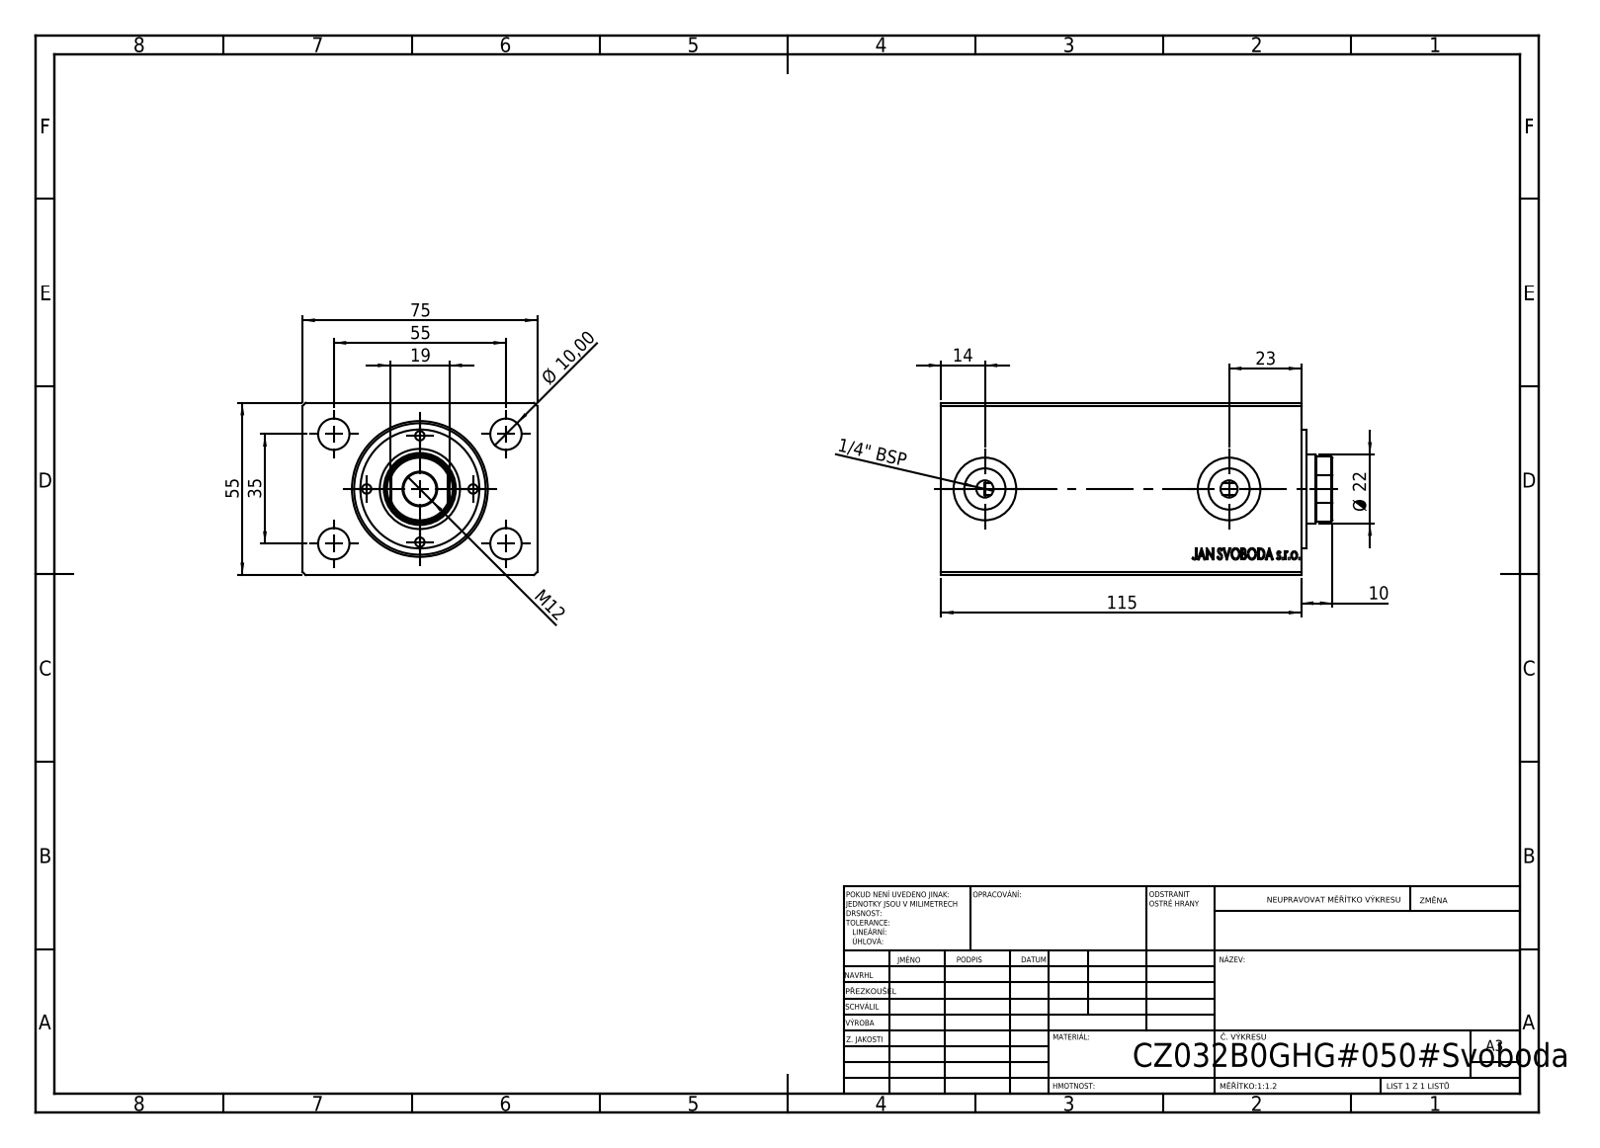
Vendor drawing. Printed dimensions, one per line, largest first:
115
75
55
55
35
23
Ø 22
19
14
M12
Ø 10,00
10
1/4" BSP
